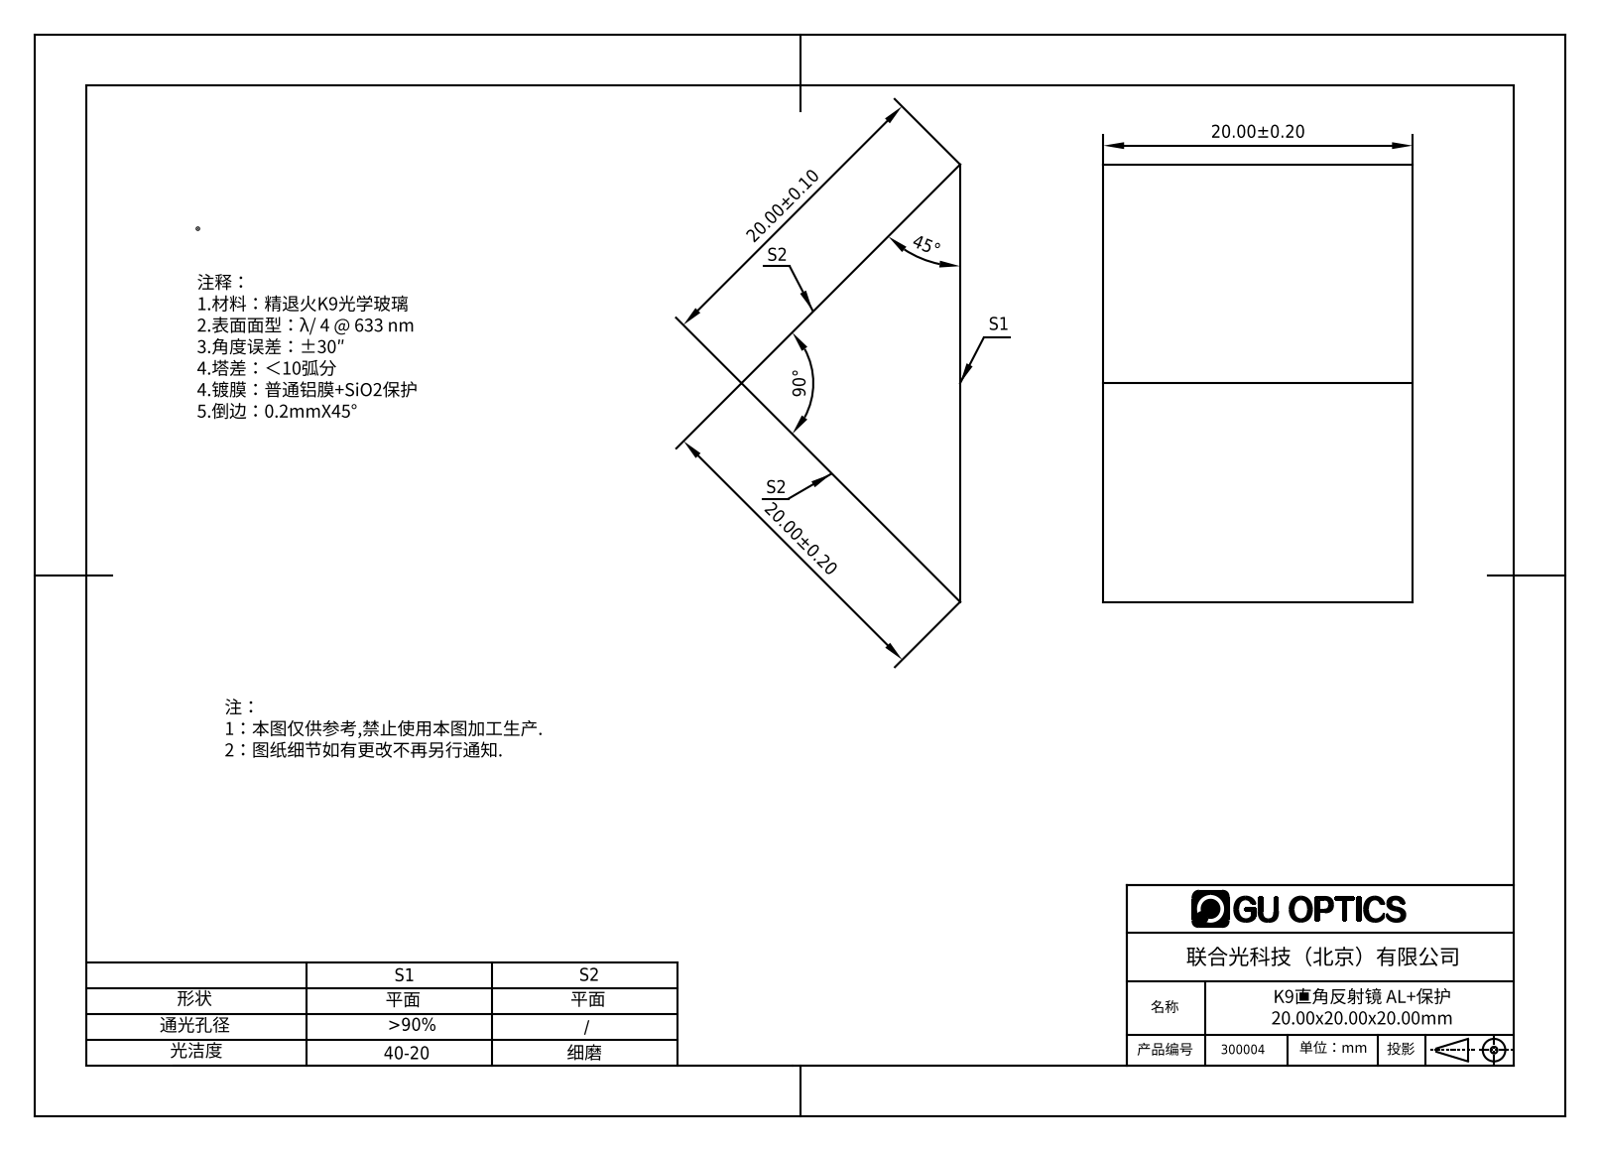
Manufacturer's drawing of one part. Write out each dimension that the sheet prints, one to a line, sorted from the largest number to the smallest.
90°
45°
20.00±0.10
20.00±0.20
20.00±0.20
